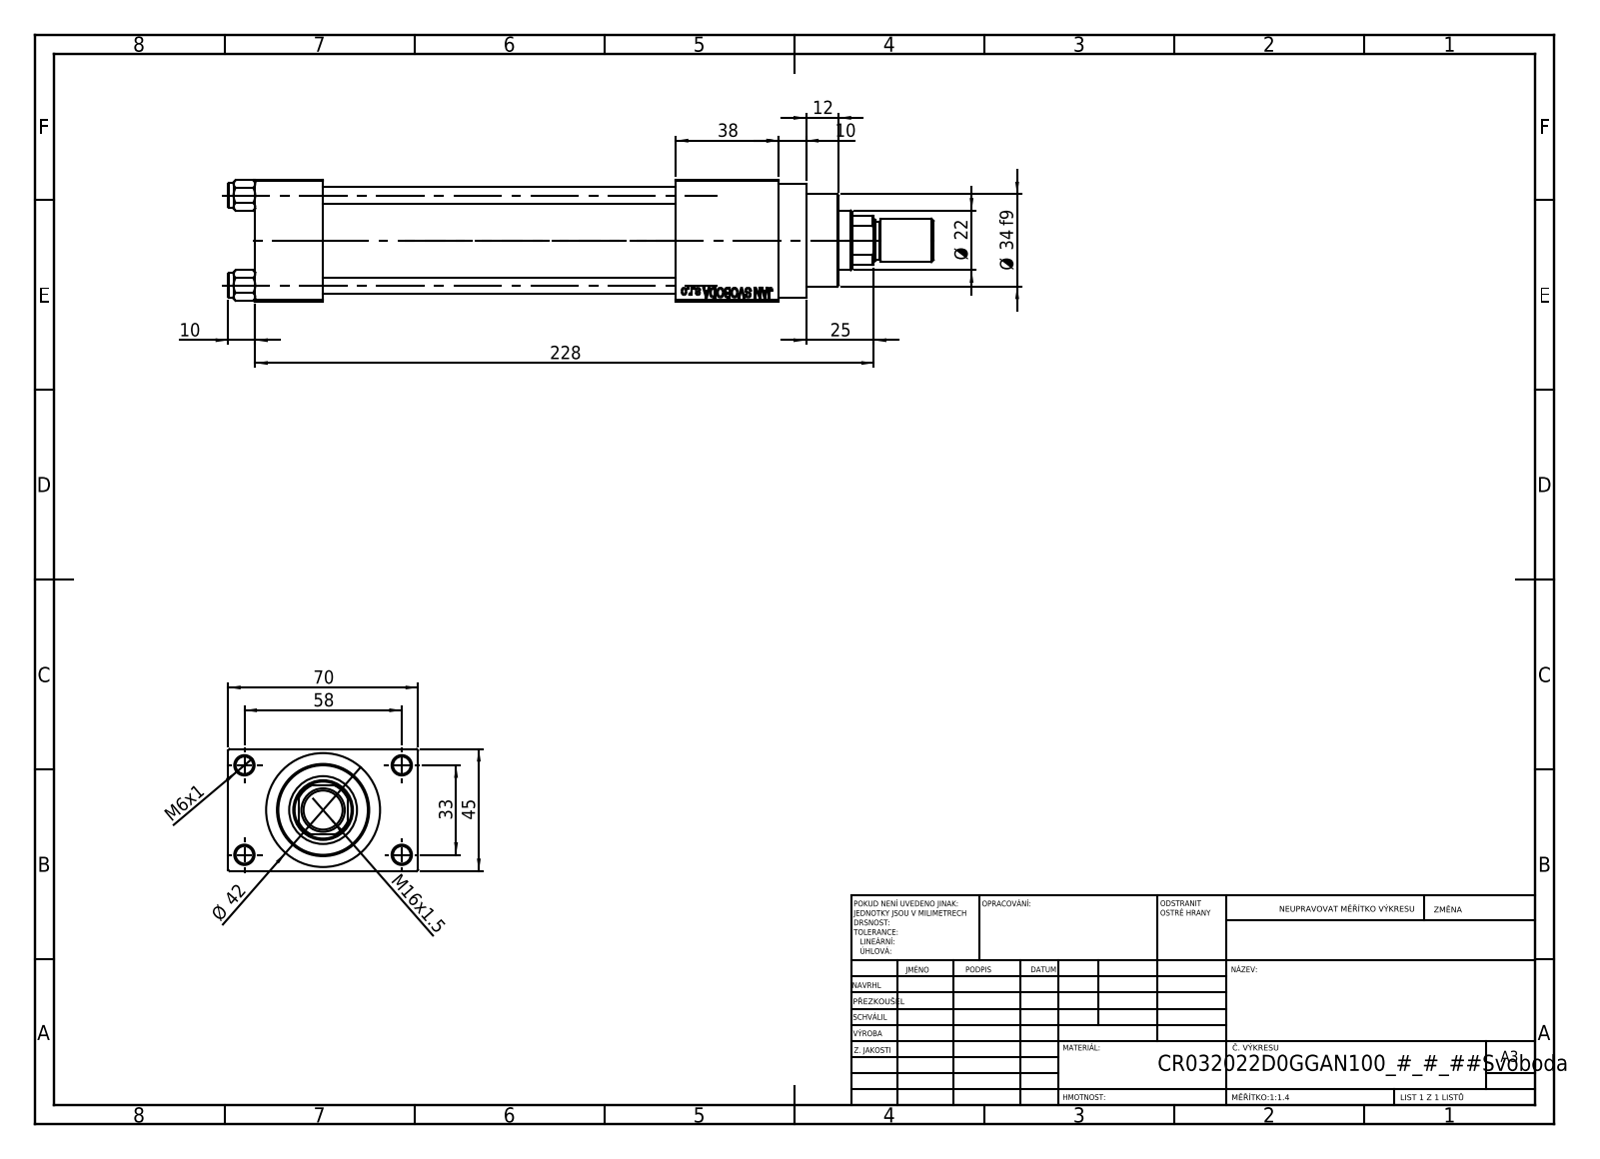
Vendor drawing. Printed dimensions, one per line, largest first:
228
70
58
45
Ø 42
38
Ø 34 f9
33
25
Ø 22
M16x1.5
12
10
10
M6x1
